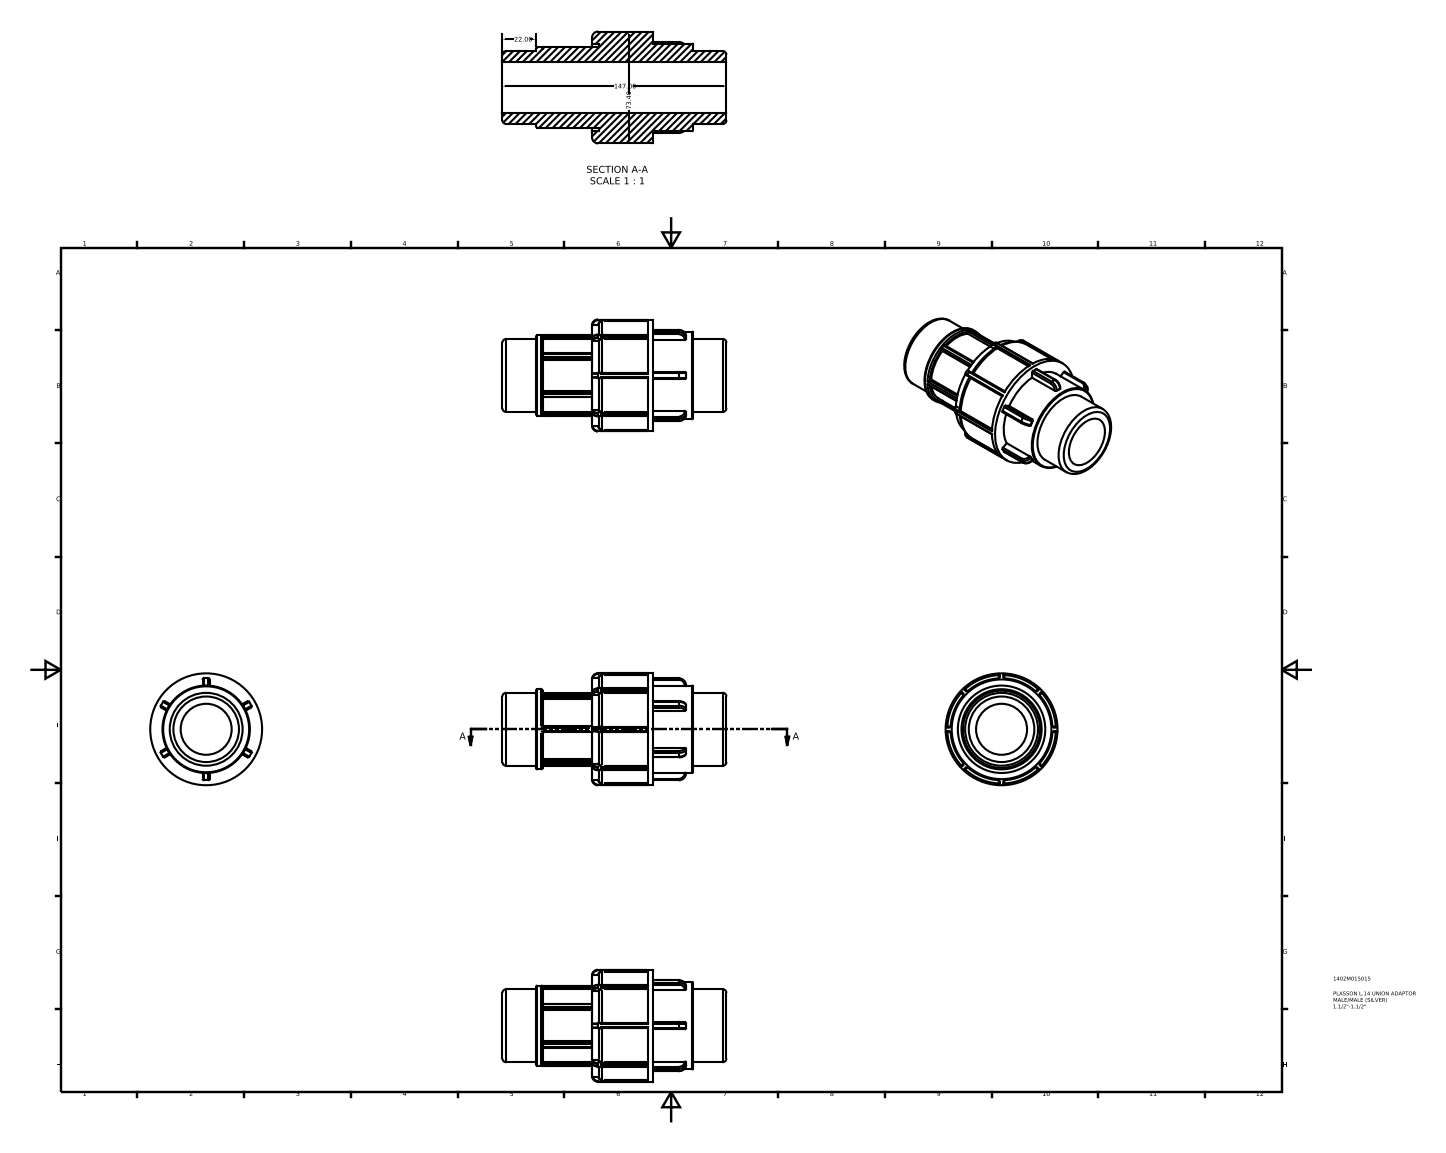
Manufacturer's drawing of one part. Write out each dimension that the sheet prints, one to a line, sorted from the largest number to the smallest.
147.00
73.40
22.00
